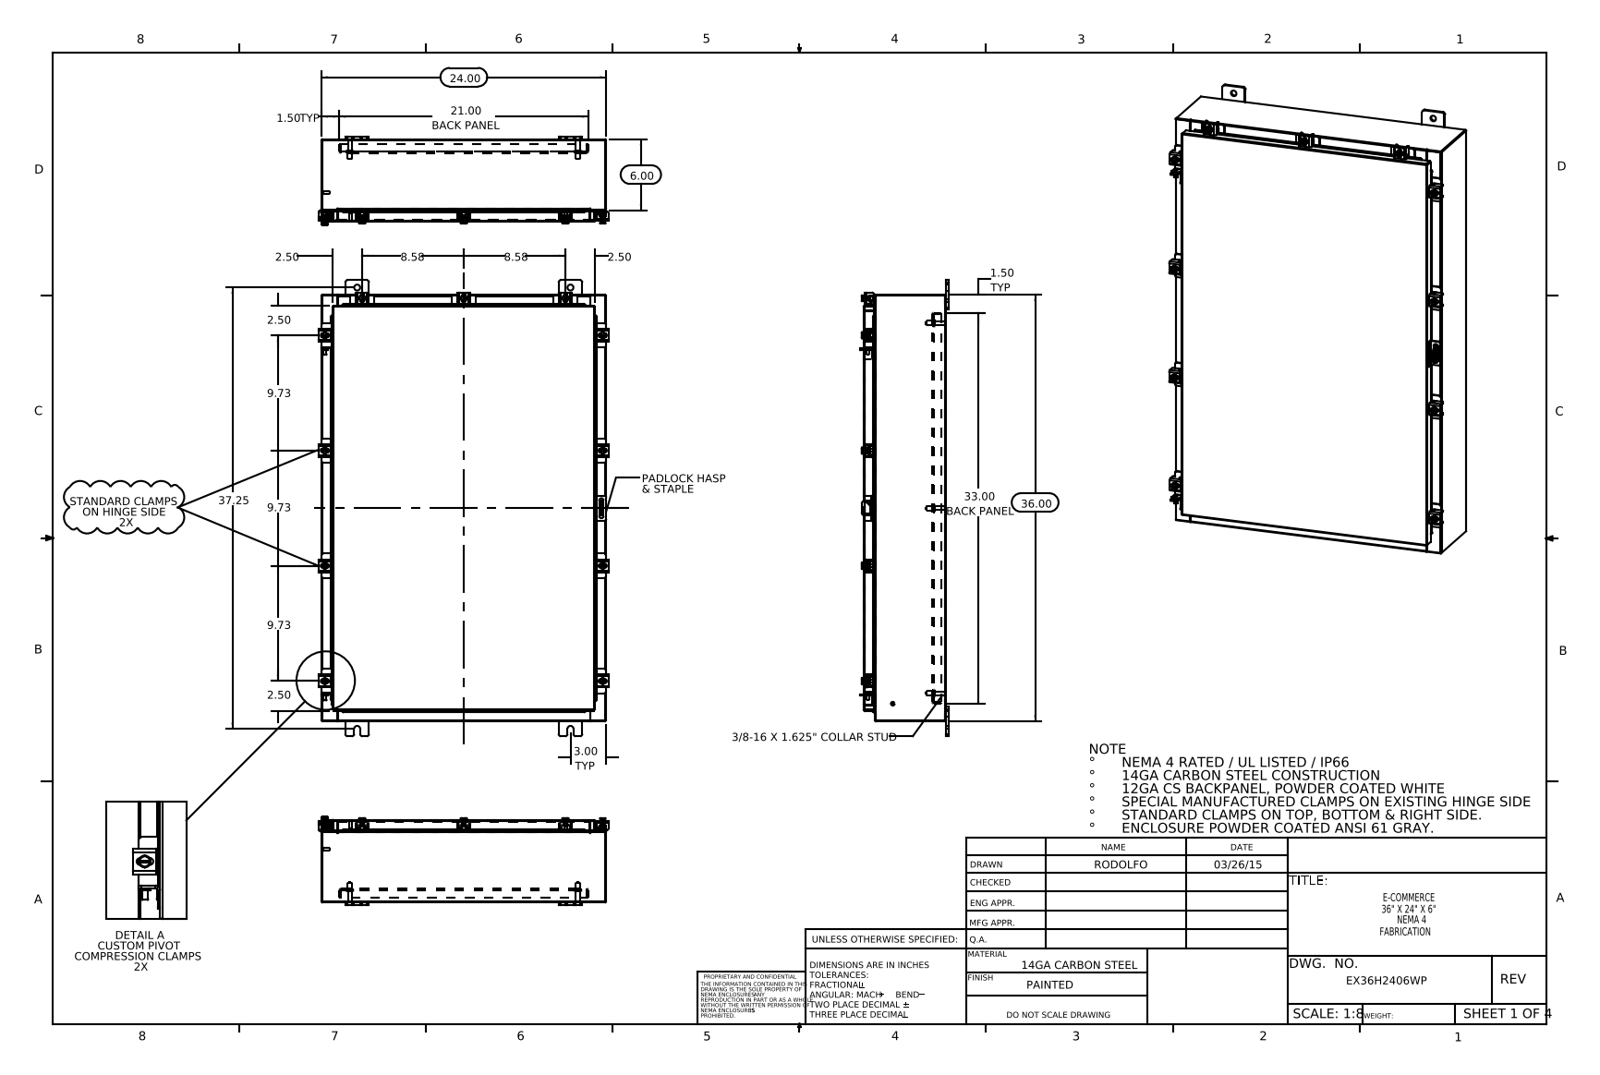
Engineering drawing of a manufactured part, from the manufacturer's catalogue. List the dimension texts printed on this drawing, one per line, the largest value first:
37.25
36.00
33.00 BACK PANEL
24.00
21.00 BACK PANEL
9.73
9.73
9.73
8.58
8.58
6.00
3.00 TYP
2.50
2.50
2.50
2.50
1.50 TYP
1.50 TYP
